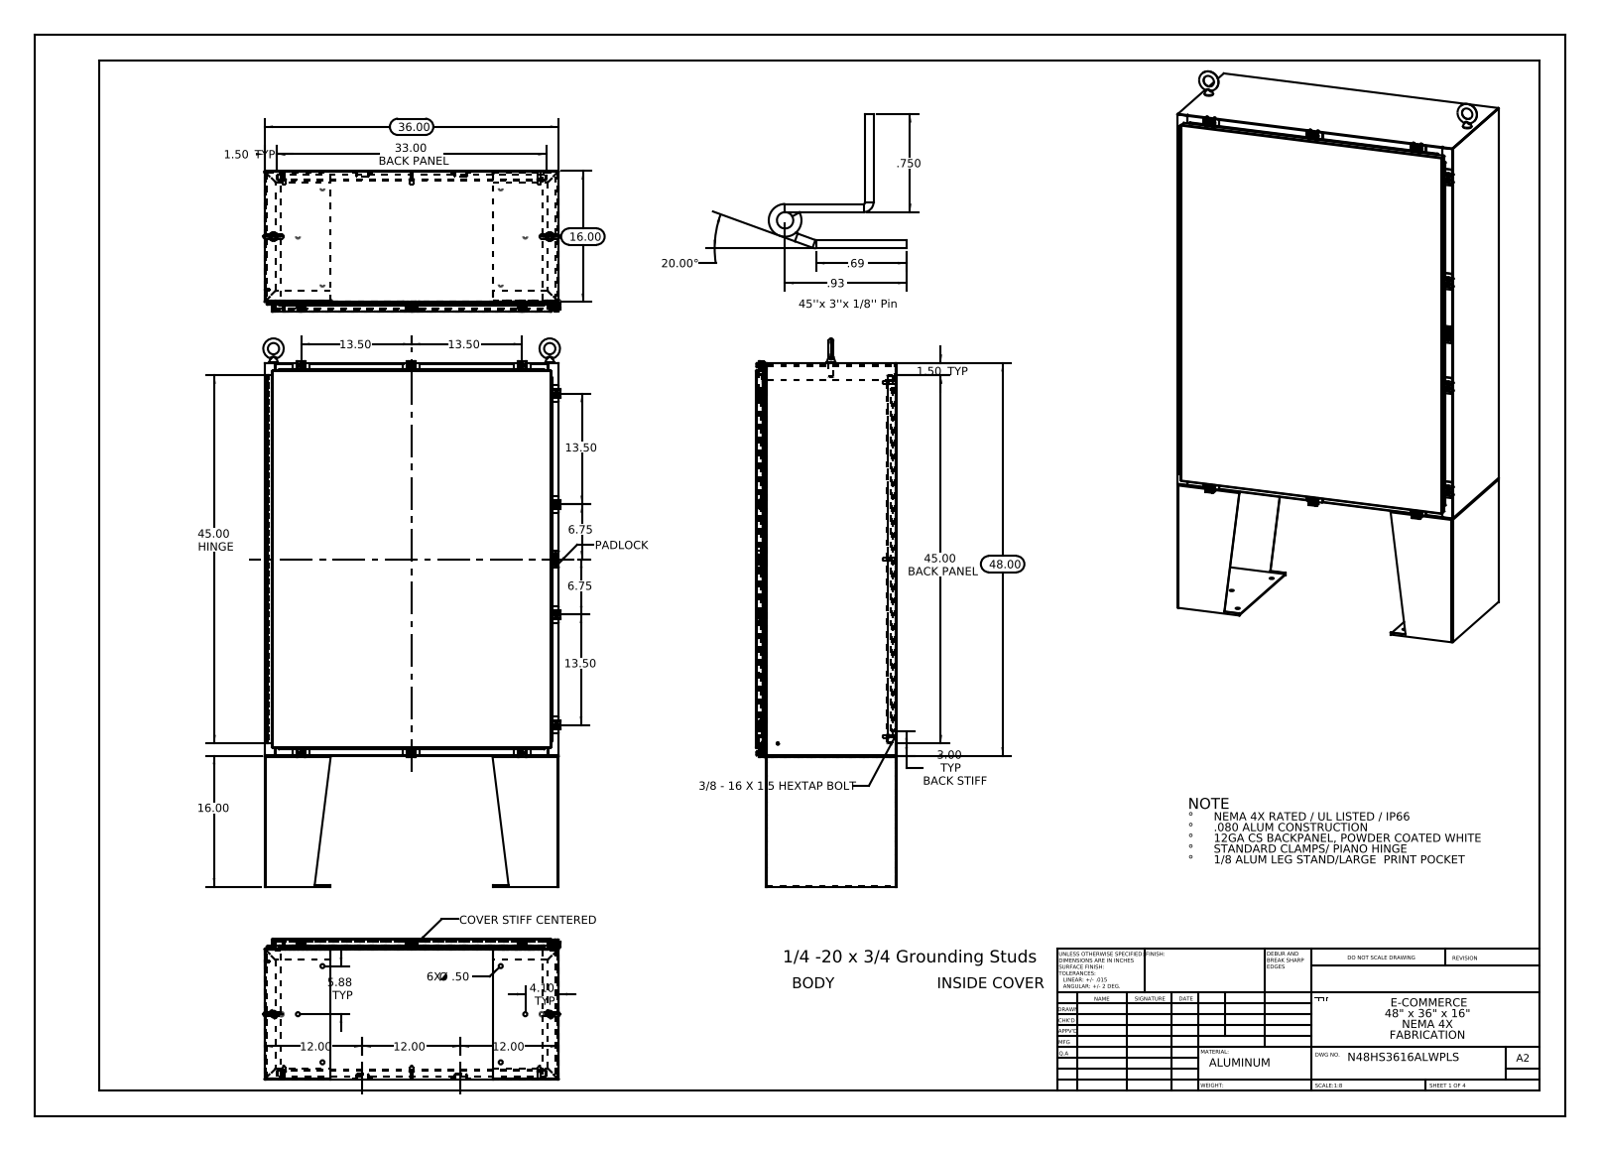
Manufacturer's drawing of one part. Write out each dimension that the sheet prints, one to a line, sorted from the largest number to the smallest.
48.00
45.00 HINGE
45.00 BACK PANEL
36.00
33.00 BACK PANEL
20.00°
16.00
16.00
13.50
13.50
13.50
13.50
12.00
12.00
12.00
6.75
6.75
5.88 TYP
4.10 TYP
3.00 TYP BACK STIFF
1.50 TYP
1.50 TYP
.93
.750
.69
6X Ø .50
